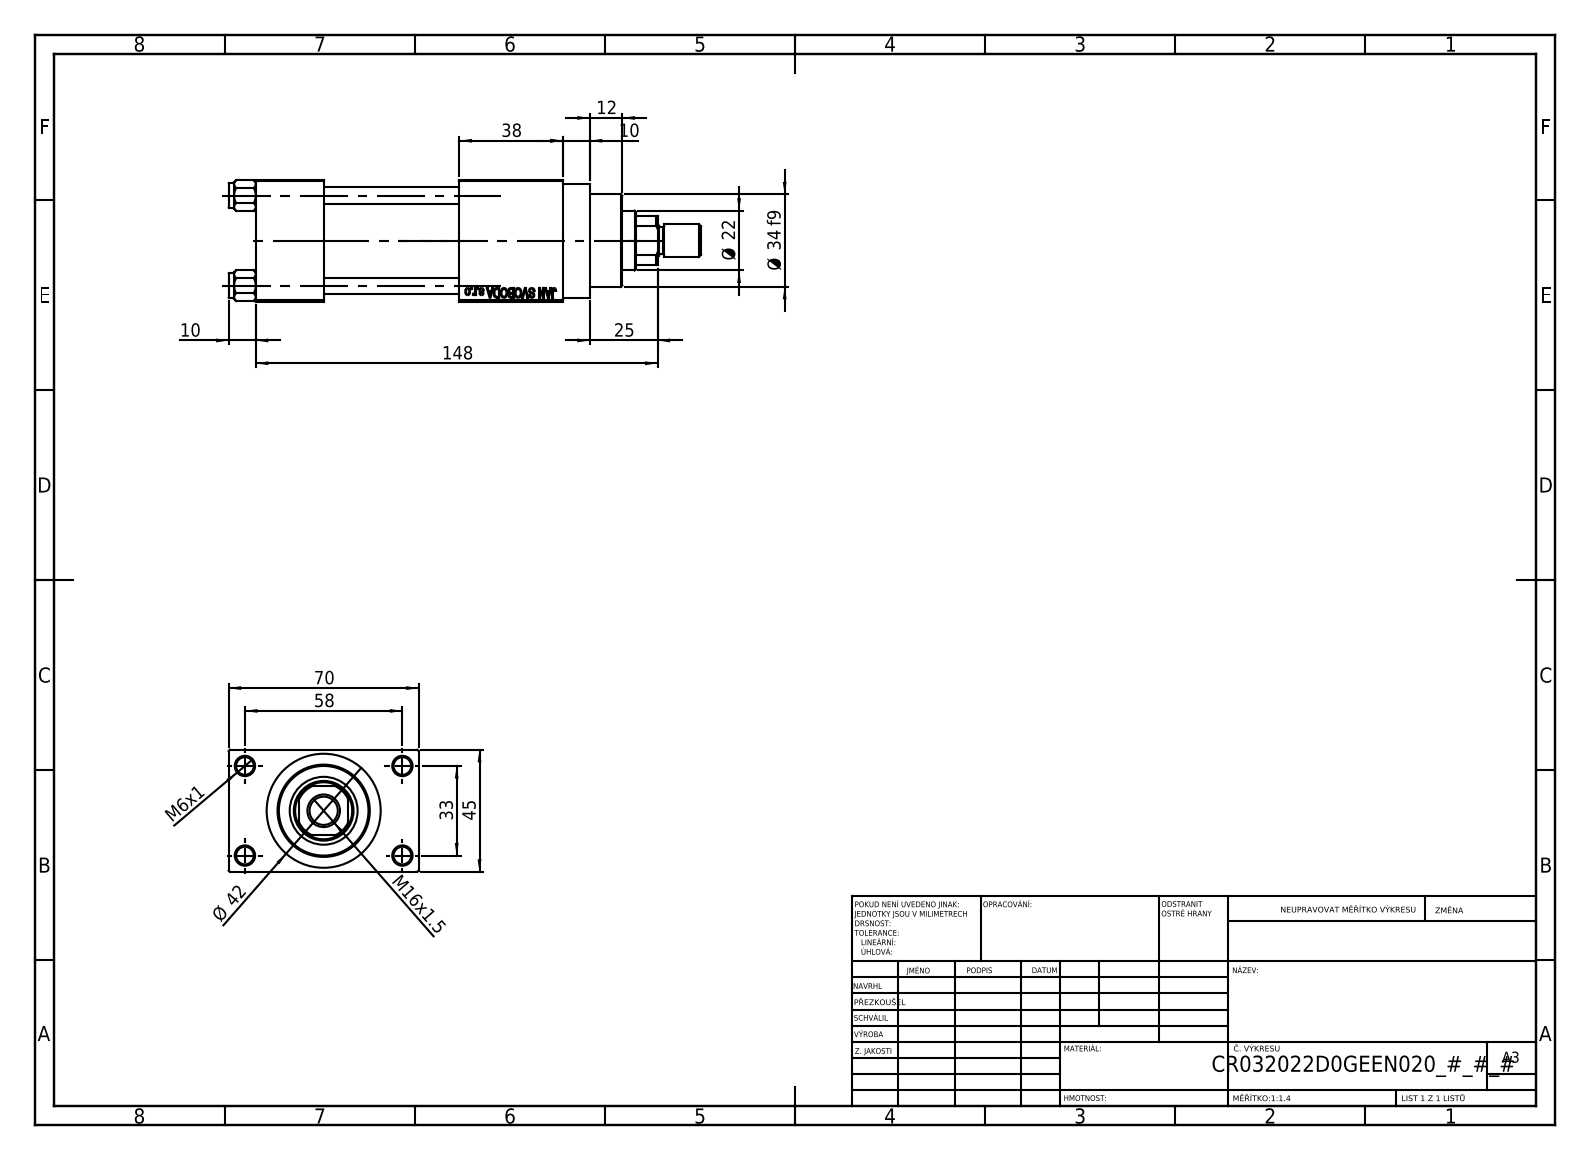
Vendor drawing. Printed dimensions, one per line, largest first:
148
70
58
45
Ø 42
38
Ø 34 f9
33
25
Ø 22
M16x1.5
12
10
10
M6x1
